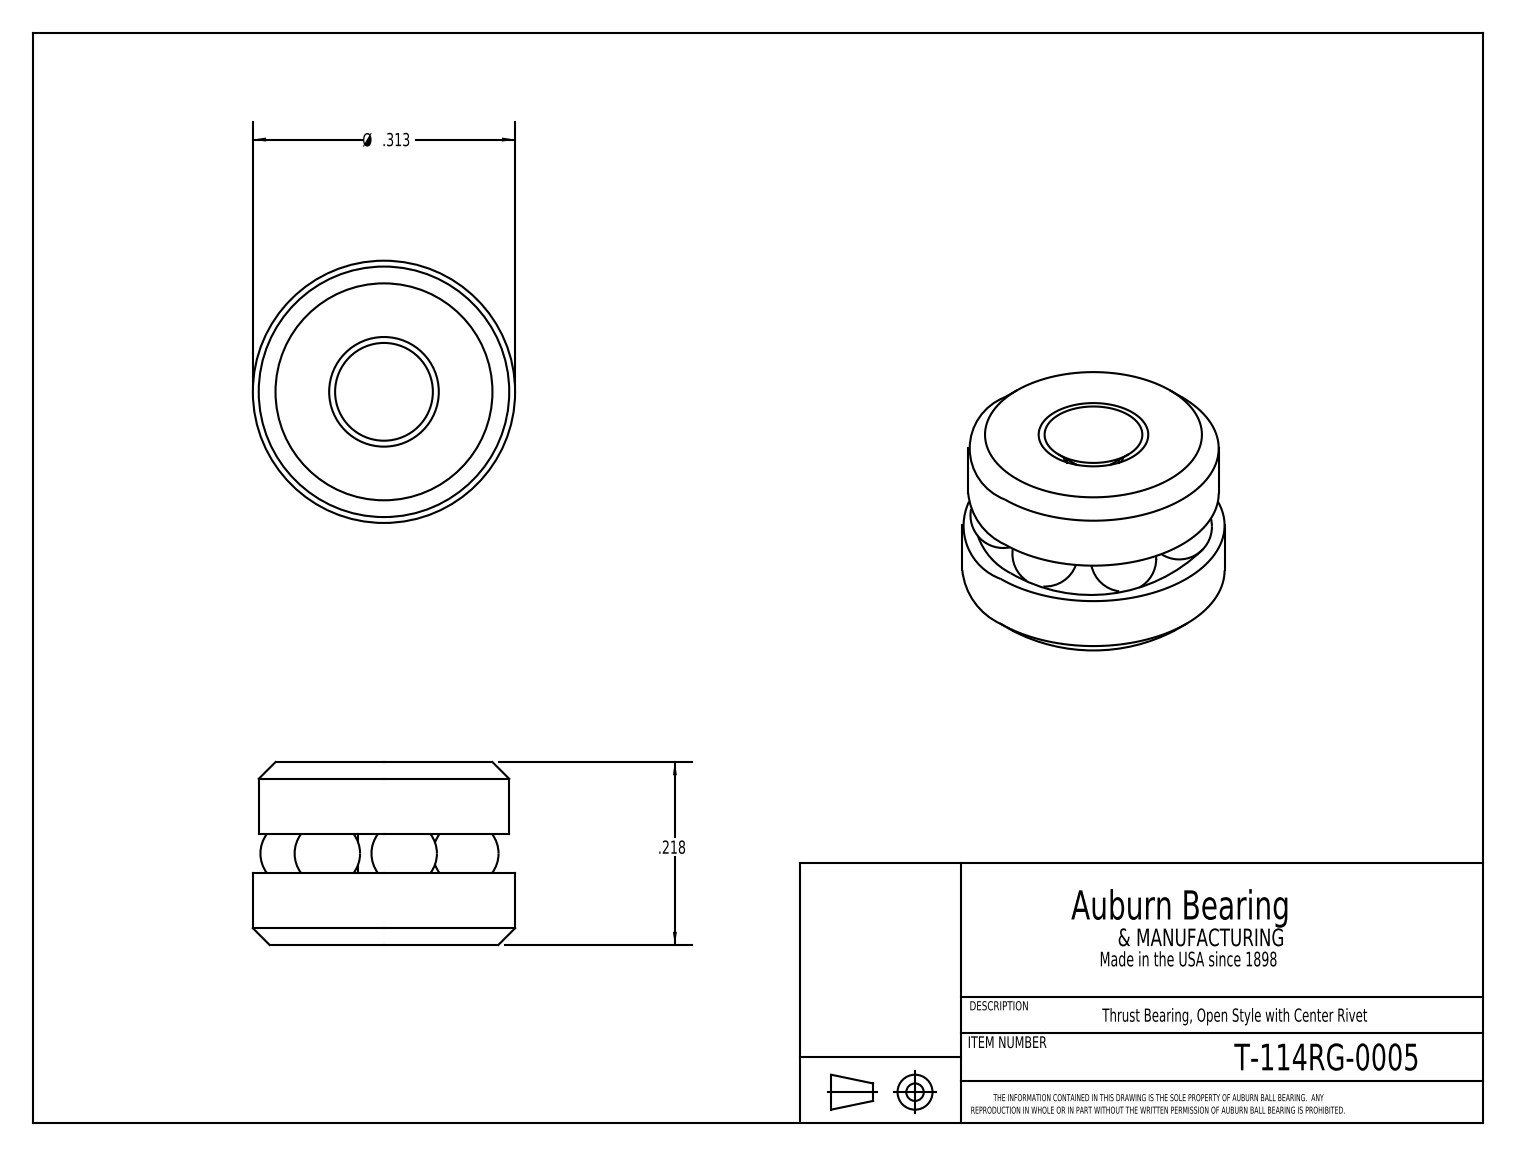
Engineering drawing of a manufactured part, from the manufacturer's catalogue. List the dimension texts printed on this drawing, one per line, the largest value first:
Ø .313
.218
